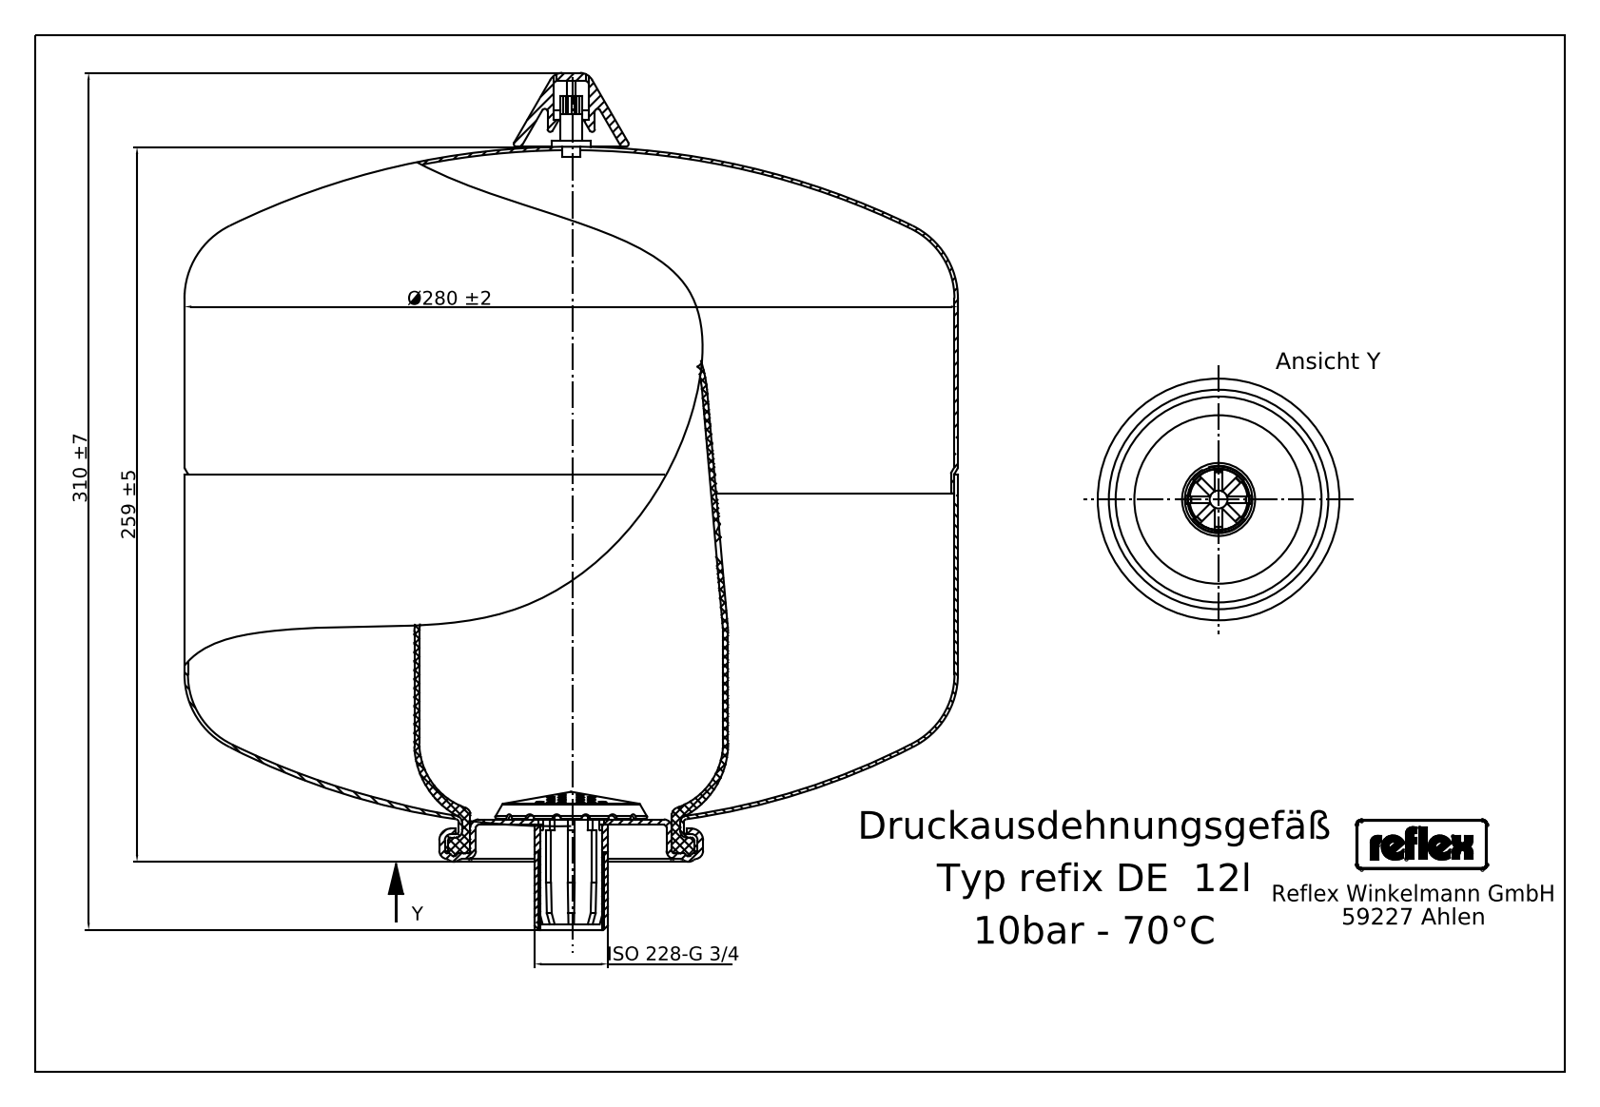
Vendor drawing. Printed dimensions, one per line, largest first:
310 ±7
Ø280 ±2
259 ±5
ISO 228-G 3/4
